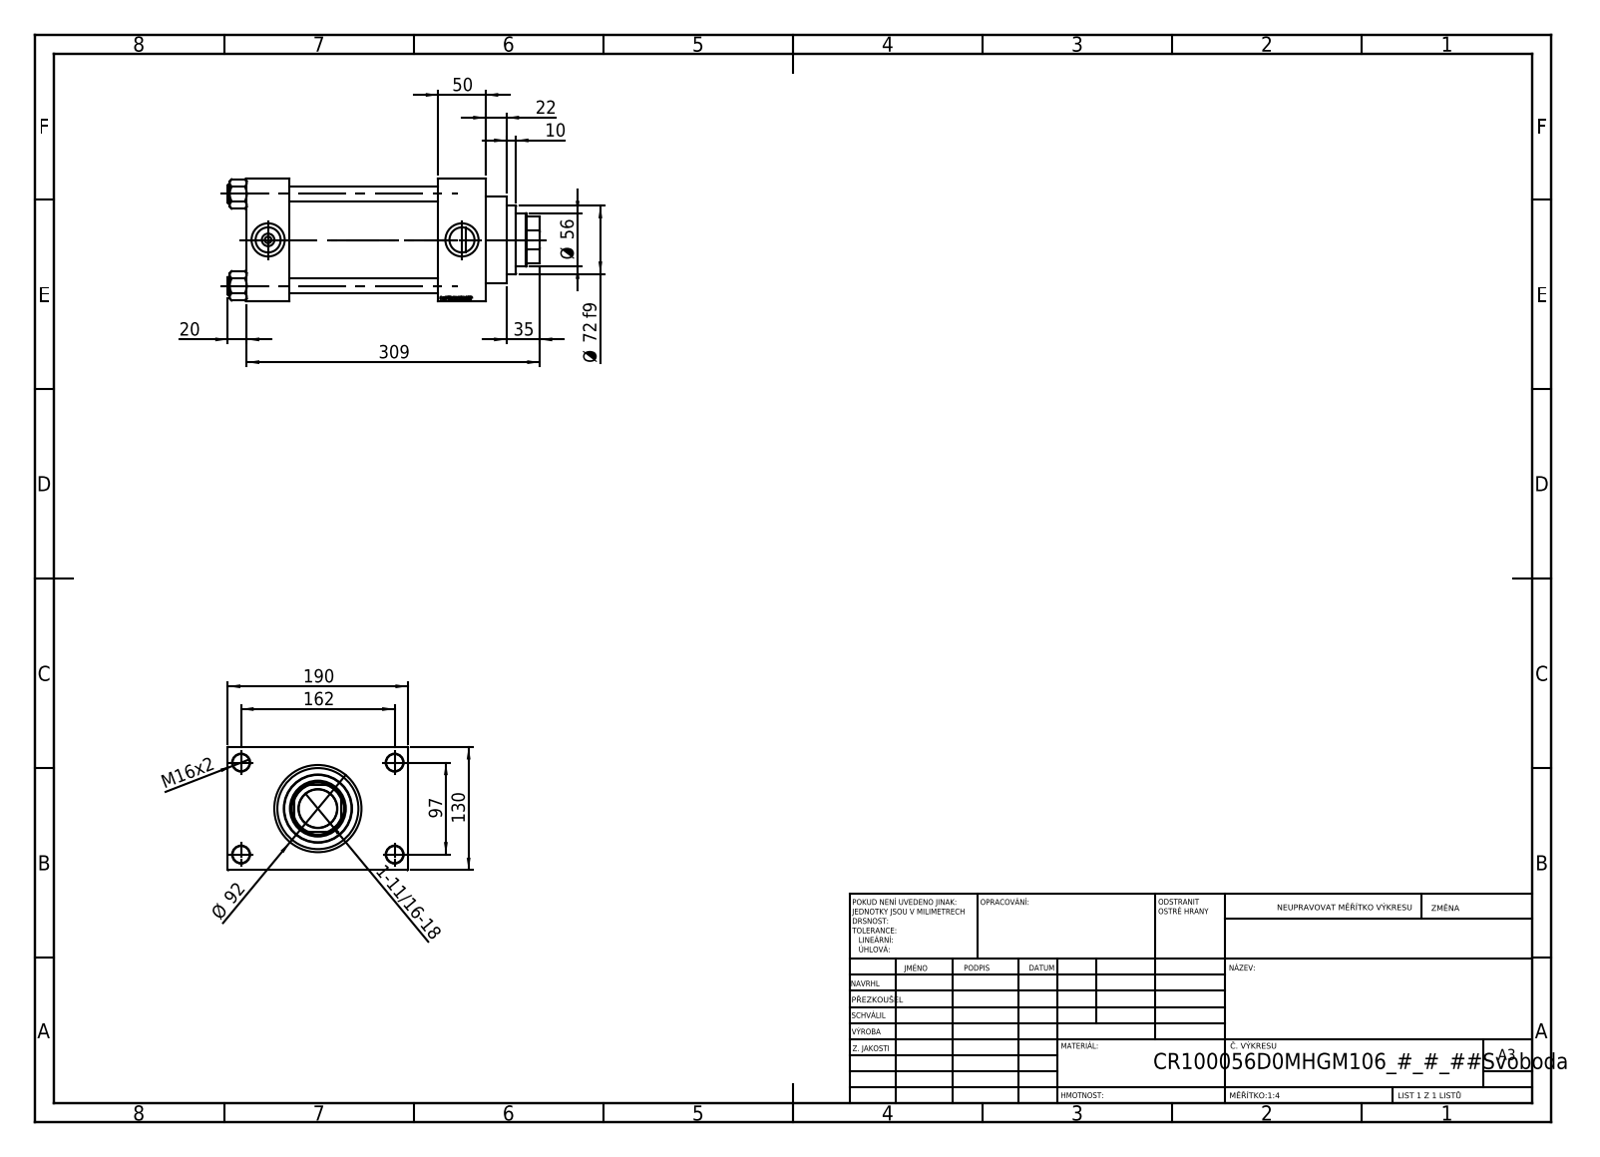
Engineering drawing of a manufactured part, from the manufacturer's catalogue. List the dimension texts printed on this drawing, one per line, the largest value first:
309
190
162
130
97
Ø 92
Ø 72 f9
Ø 56
50
35
22
20
M16x2
10
1-11/16-18
